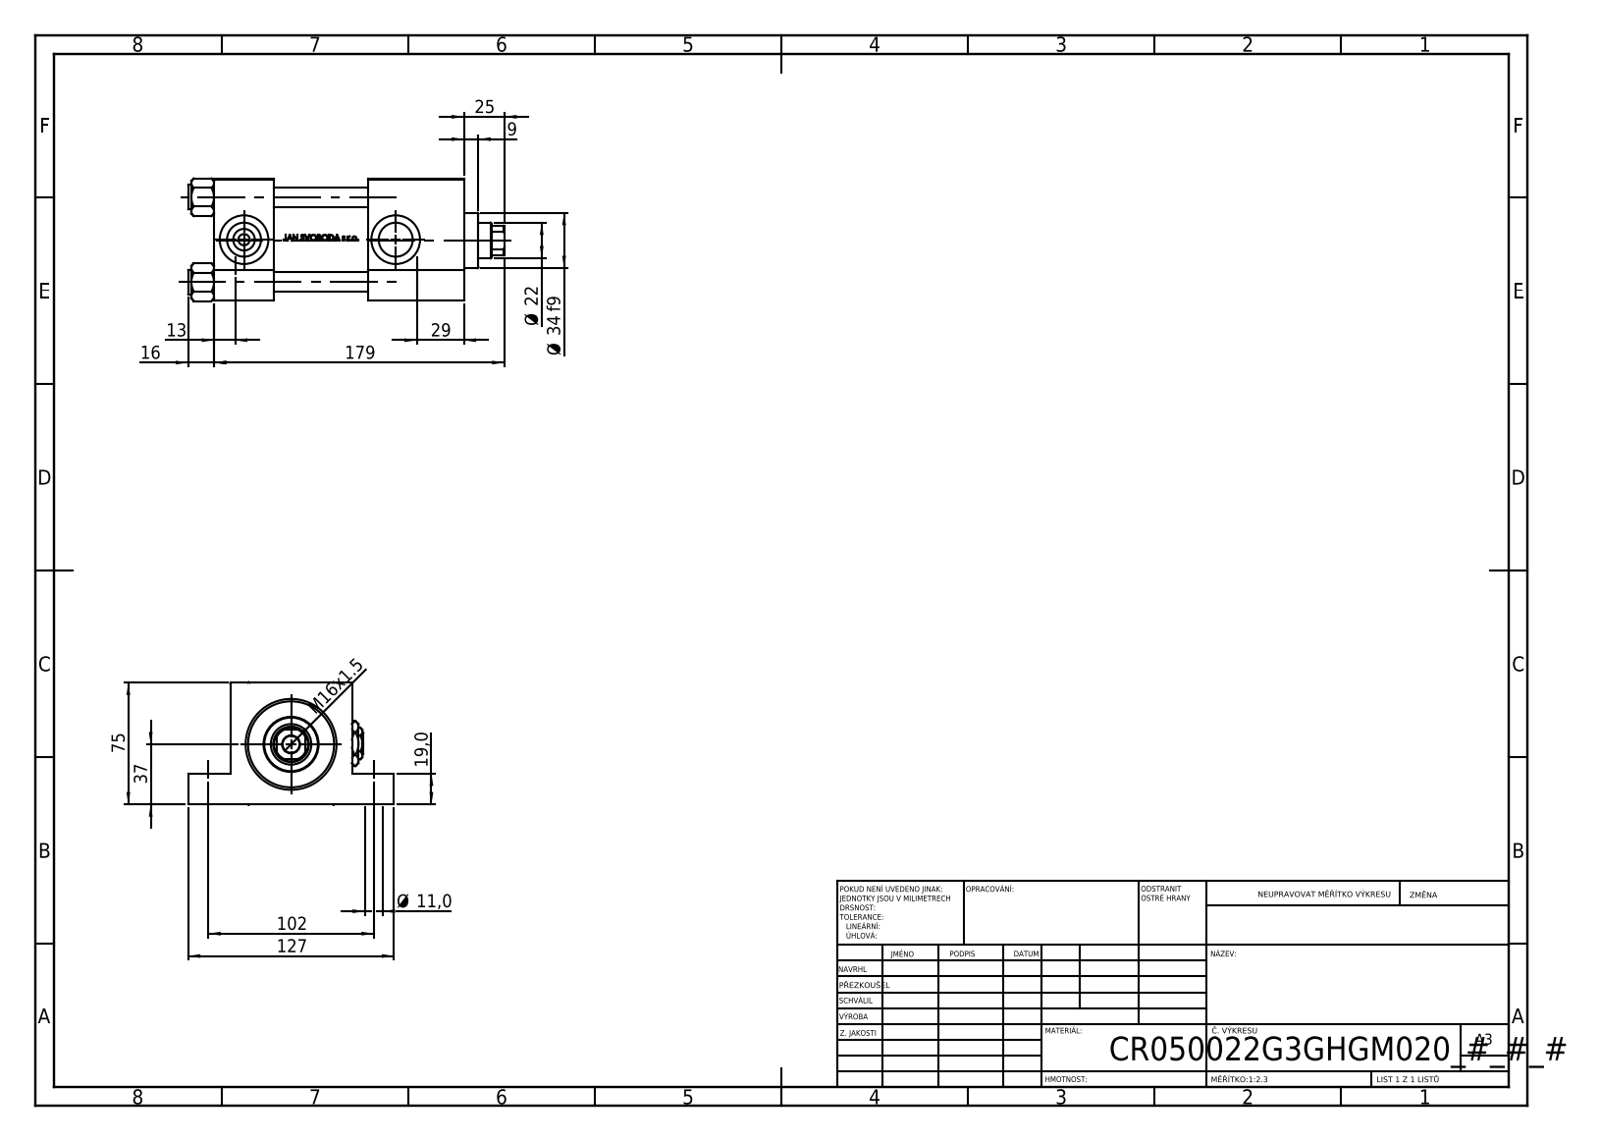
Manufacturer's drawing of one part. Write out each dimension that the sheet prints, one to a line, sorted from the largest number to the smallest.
179
127
102
75
37
Ø 34 f9
29
25
Ø 22
19,0
16
M16x1.5
13
Ø 11,0
9
